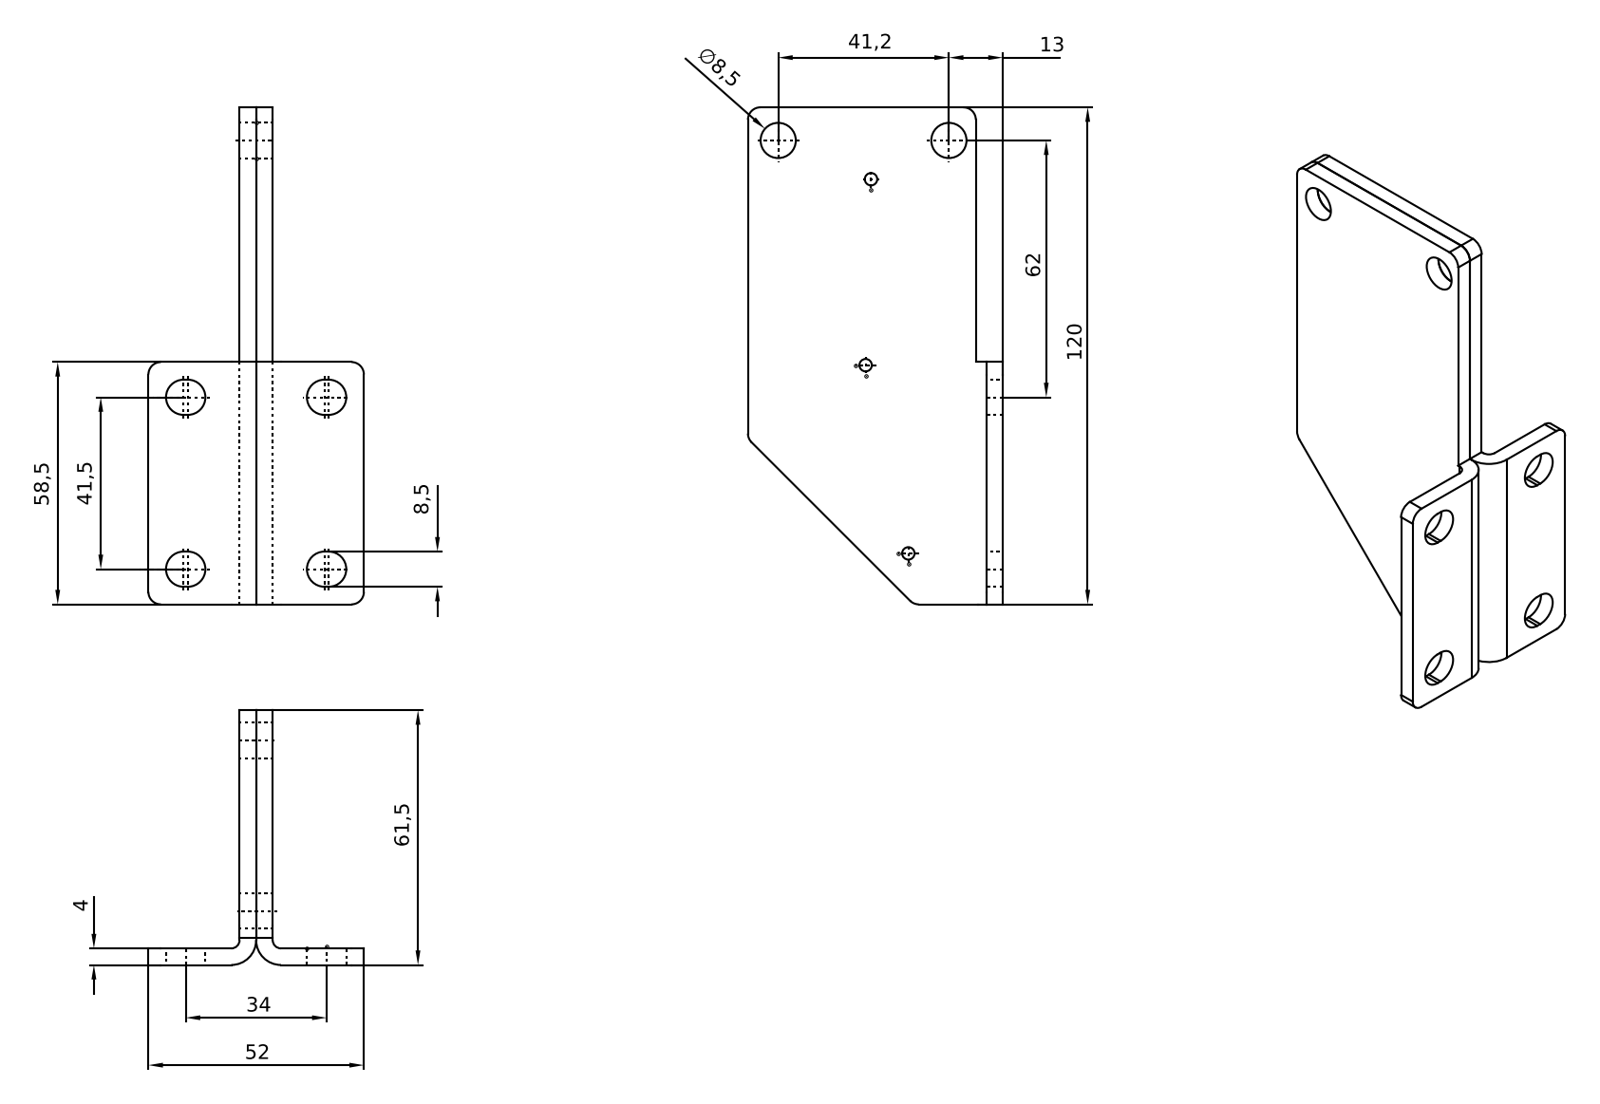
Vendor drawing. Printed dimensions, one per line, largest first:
120
62
61,5
58,5
52
41,5
41,2
34
13
∅8,5
8,5
4
